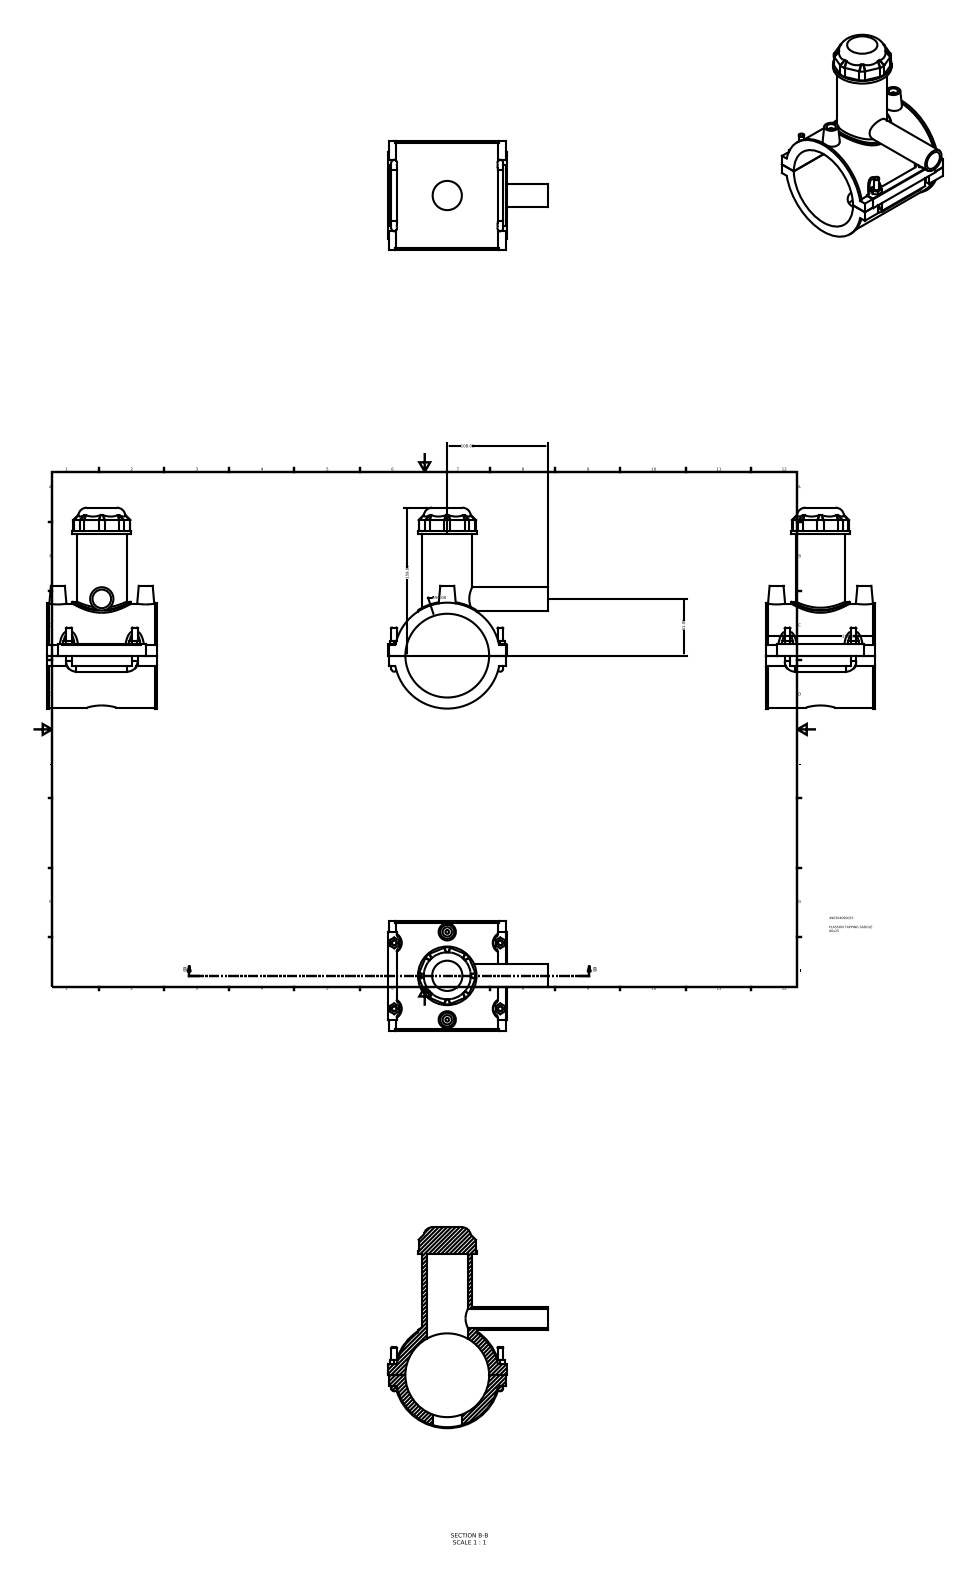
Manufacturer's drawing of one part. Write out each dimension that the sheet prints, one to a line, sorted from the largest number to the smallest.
159.00
118.00
108.00
∅90.00
61.00
